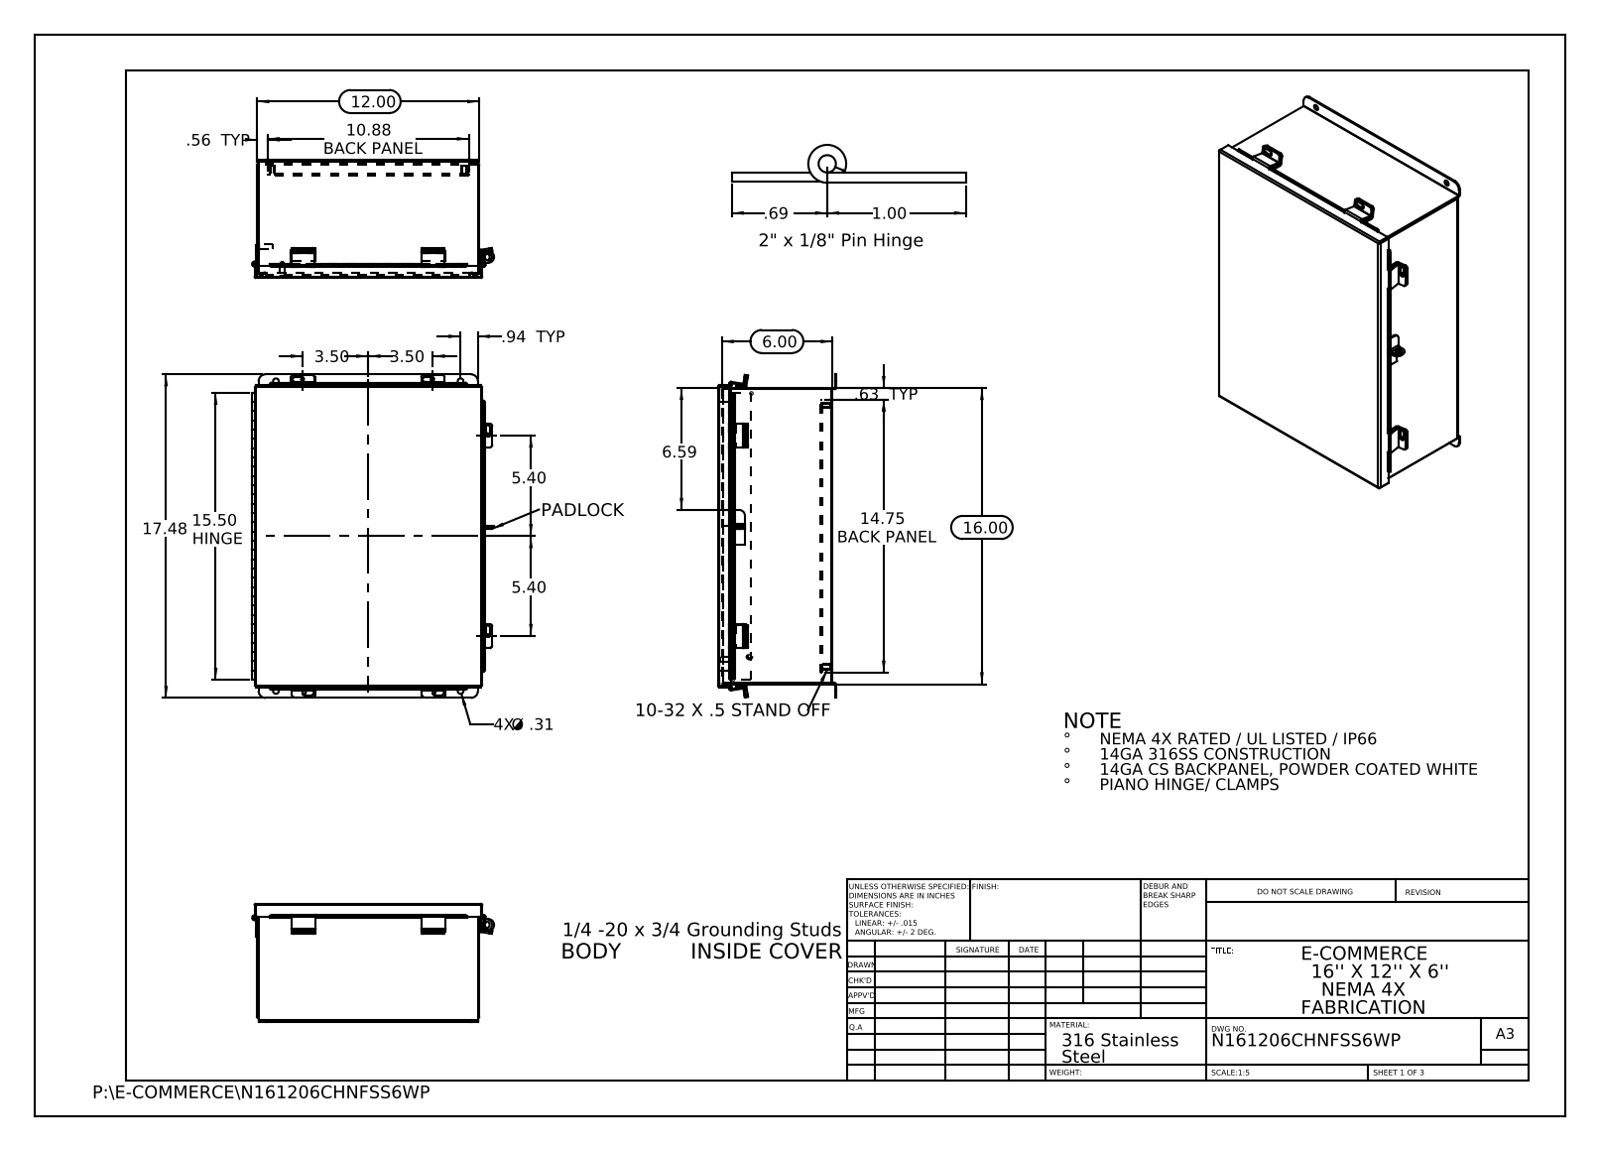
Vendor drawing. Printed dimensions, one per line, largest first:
17.48
16.00
15.50 HINGE
14.75 BACK PANEL
12.00
10.88 BACK PANEL
6.59
6.00
5.40
5.40
3.50
3.50
1.00
.94 TYP
.69
.63 TYP
.56 TYP
4X Ø .31
